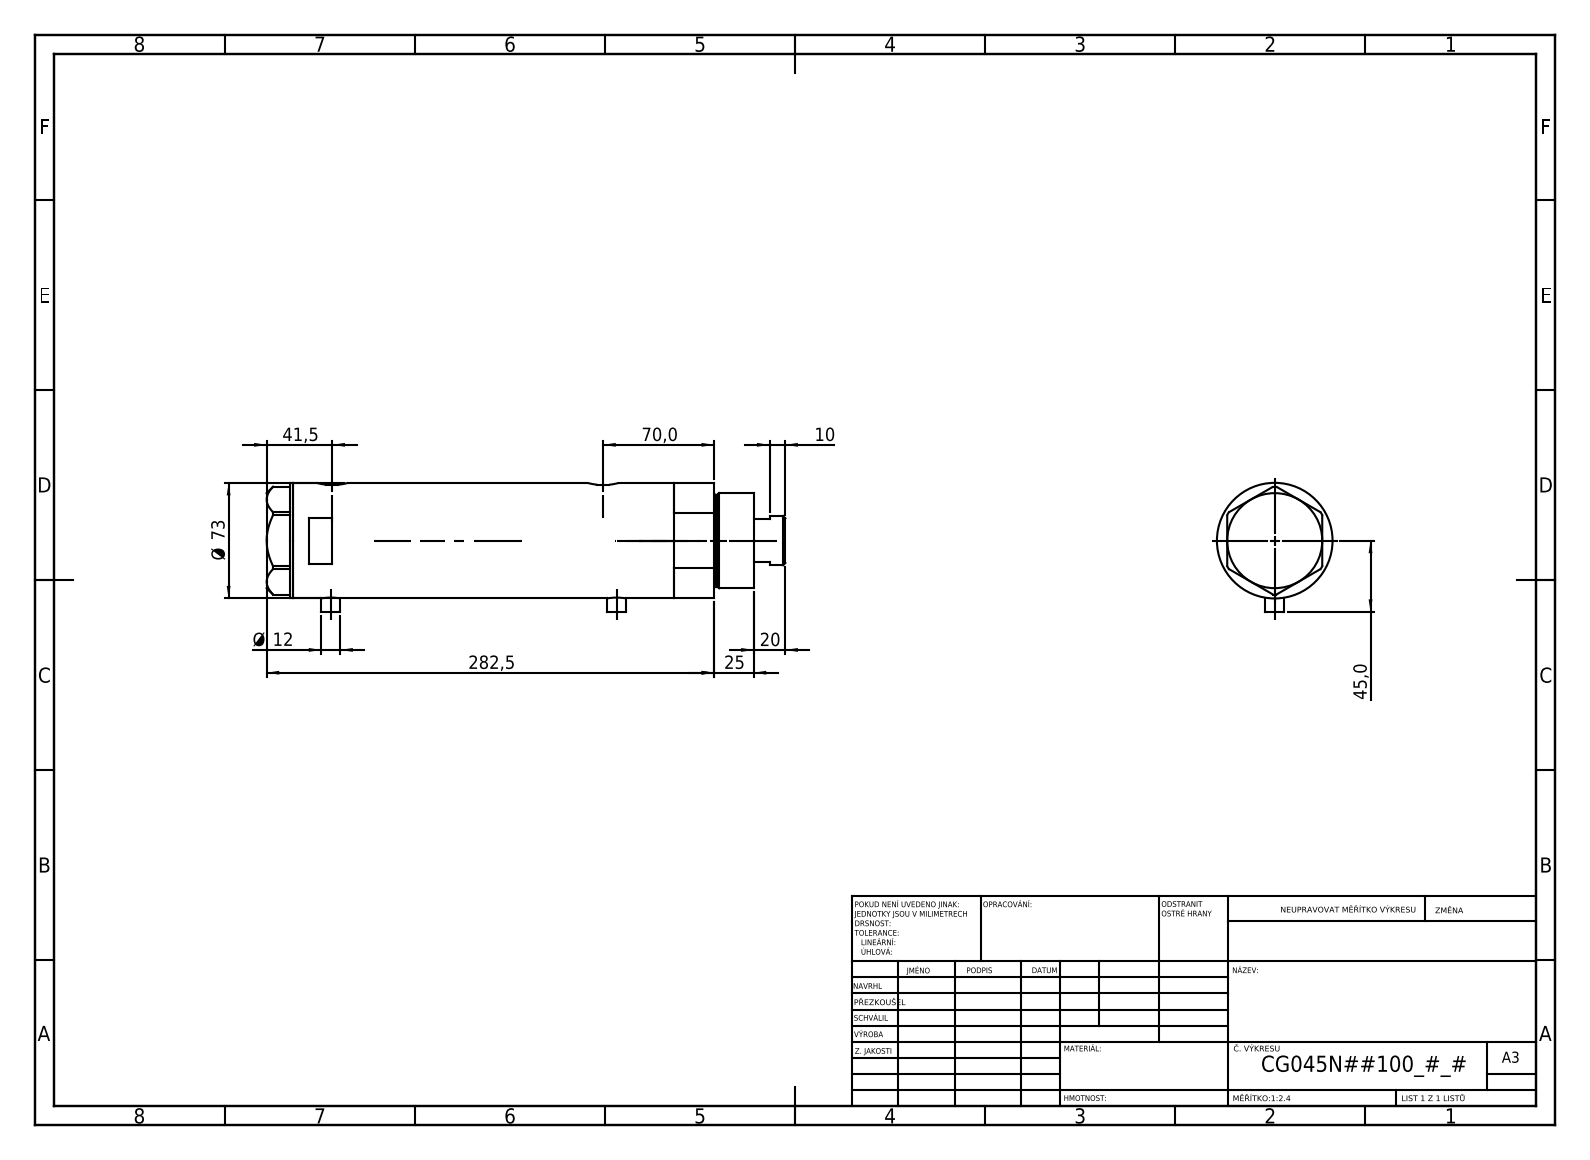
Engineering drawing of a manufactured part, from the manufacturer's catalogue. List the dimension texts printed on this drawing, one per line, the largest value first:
282,5
Ø 73
70,0
45,0
41,5
25
20
Ø 12
10
